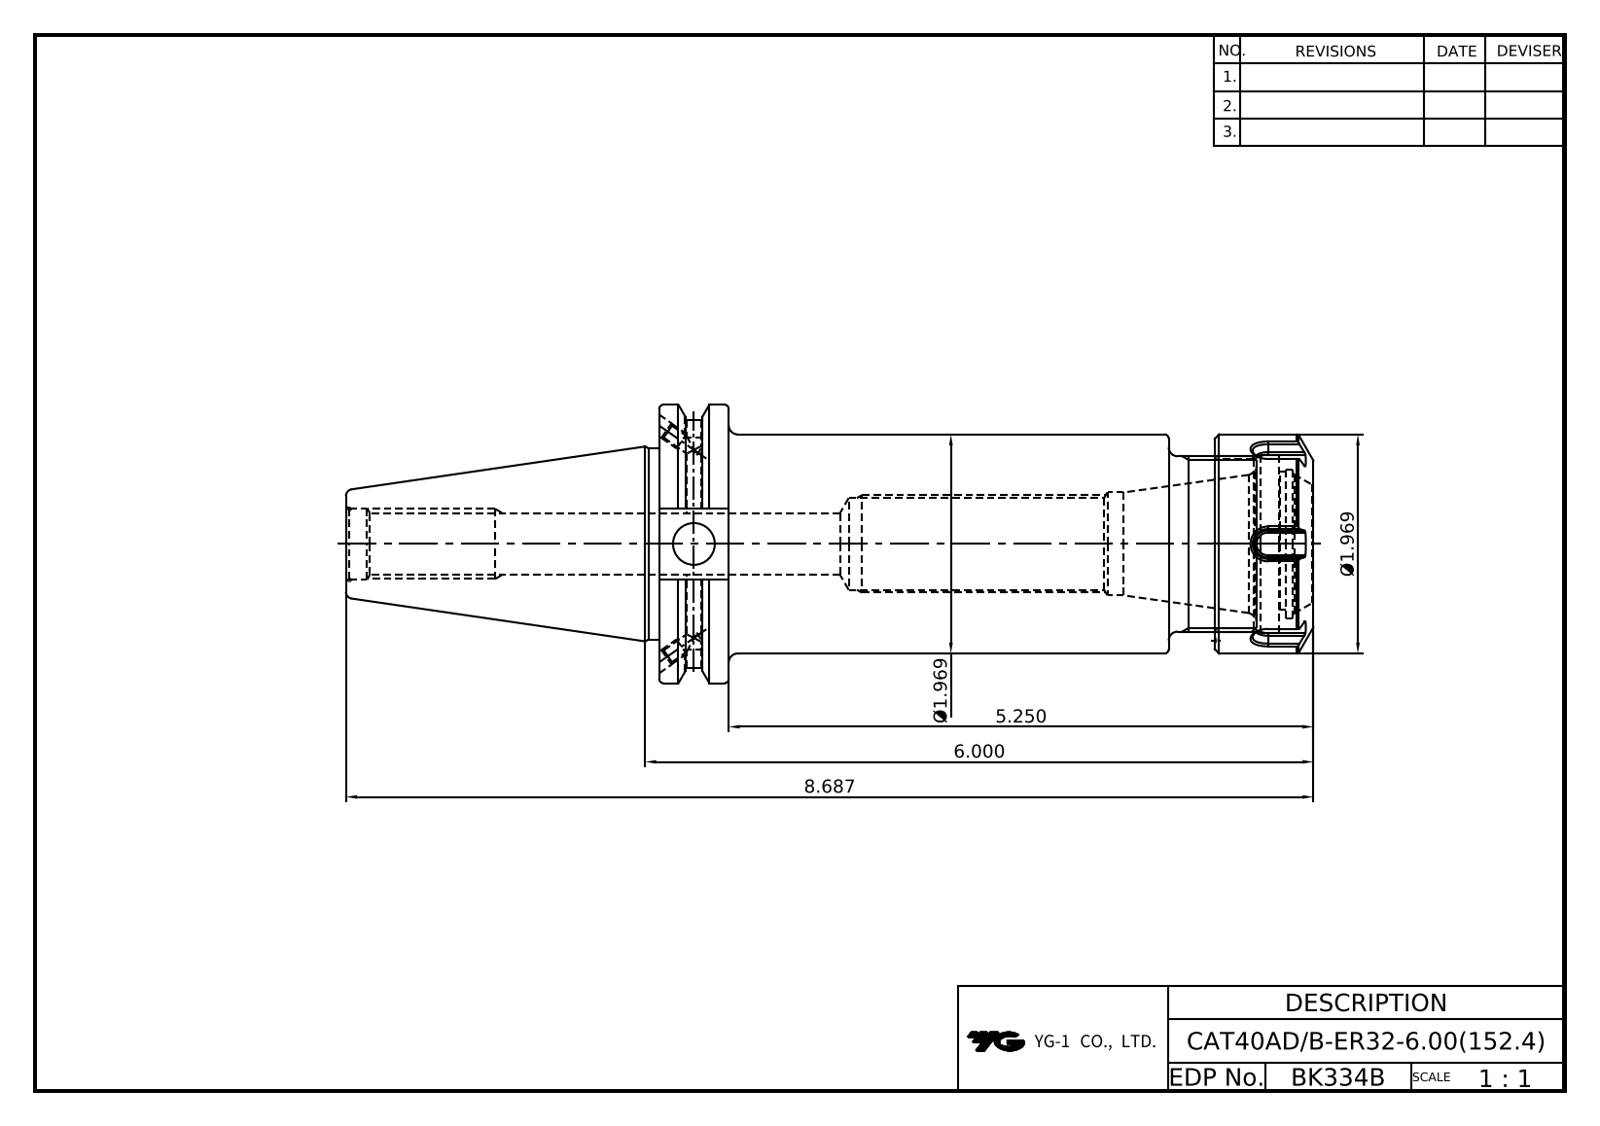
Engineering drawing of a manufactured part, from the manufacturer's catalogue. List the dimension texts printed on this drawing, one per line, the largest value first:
8.687
6.000
5.250
Ø1.969
Ø1.969
